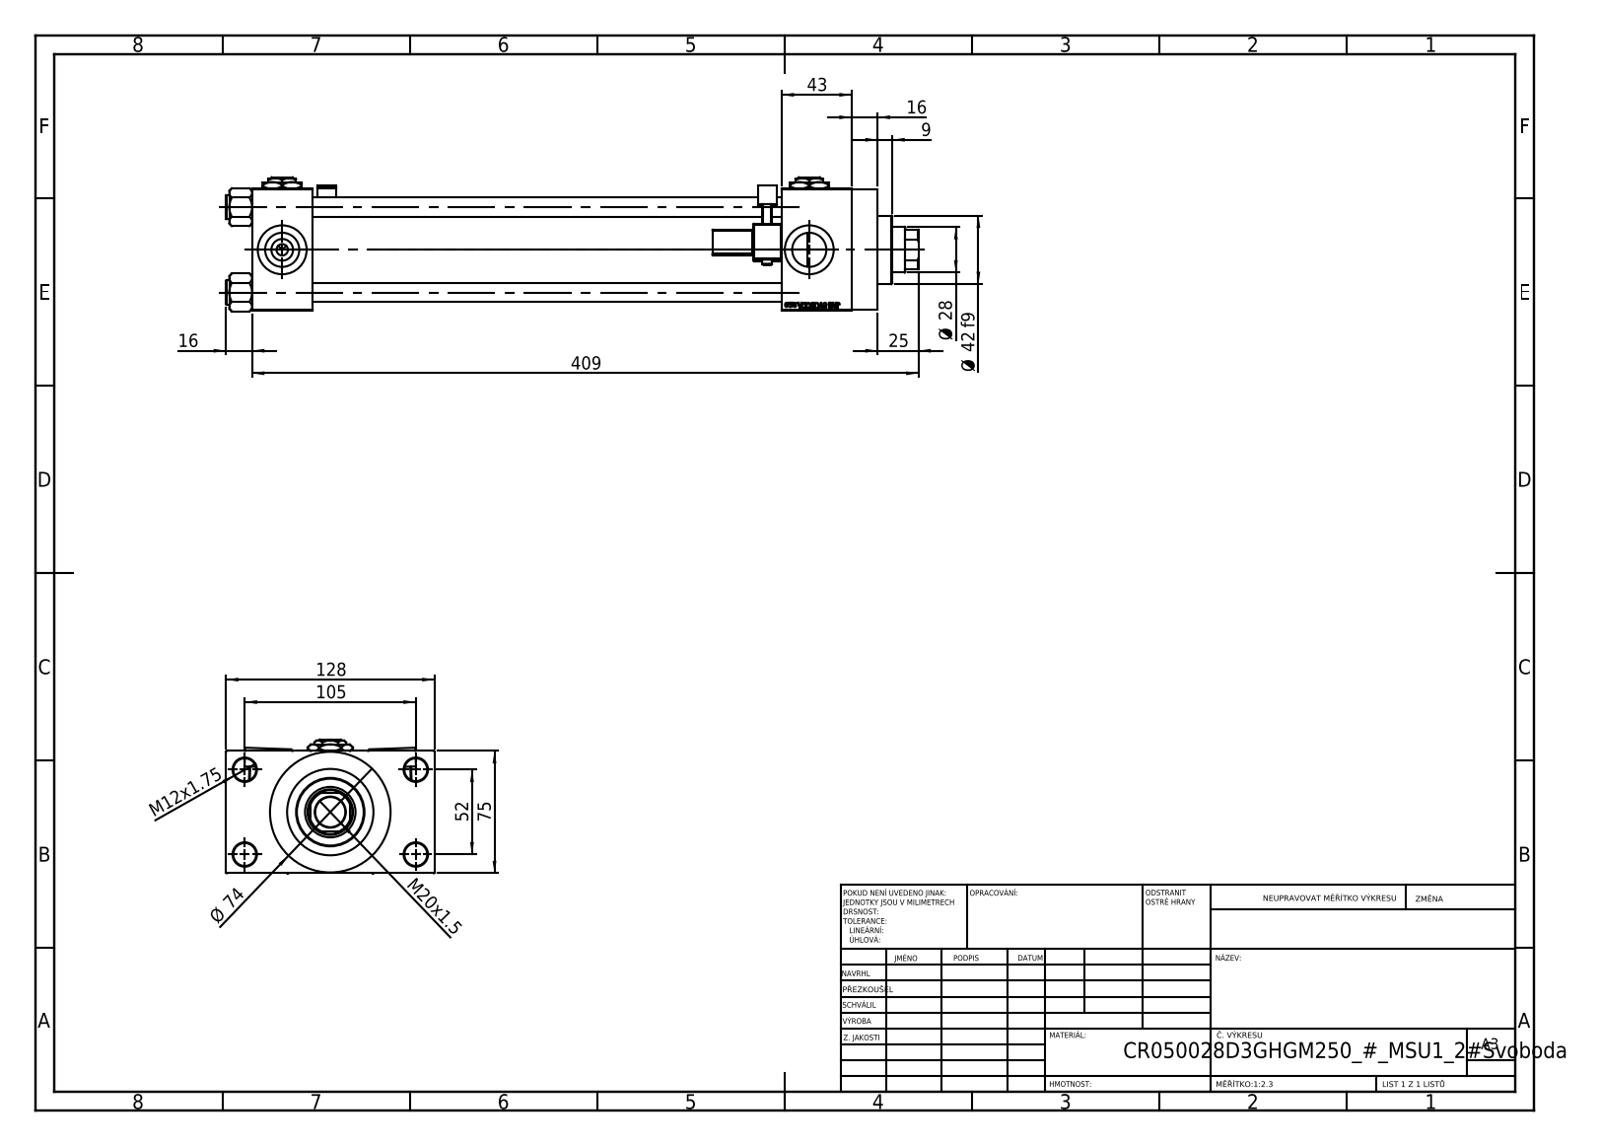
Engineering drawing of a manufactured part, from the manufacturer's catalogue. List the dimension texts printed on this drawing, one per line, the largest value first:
409
128
105
75
Ø 74
52
43
Ø 42 f9
Ø 28
25
M20x1.5
16
16
M12x1.75
9
